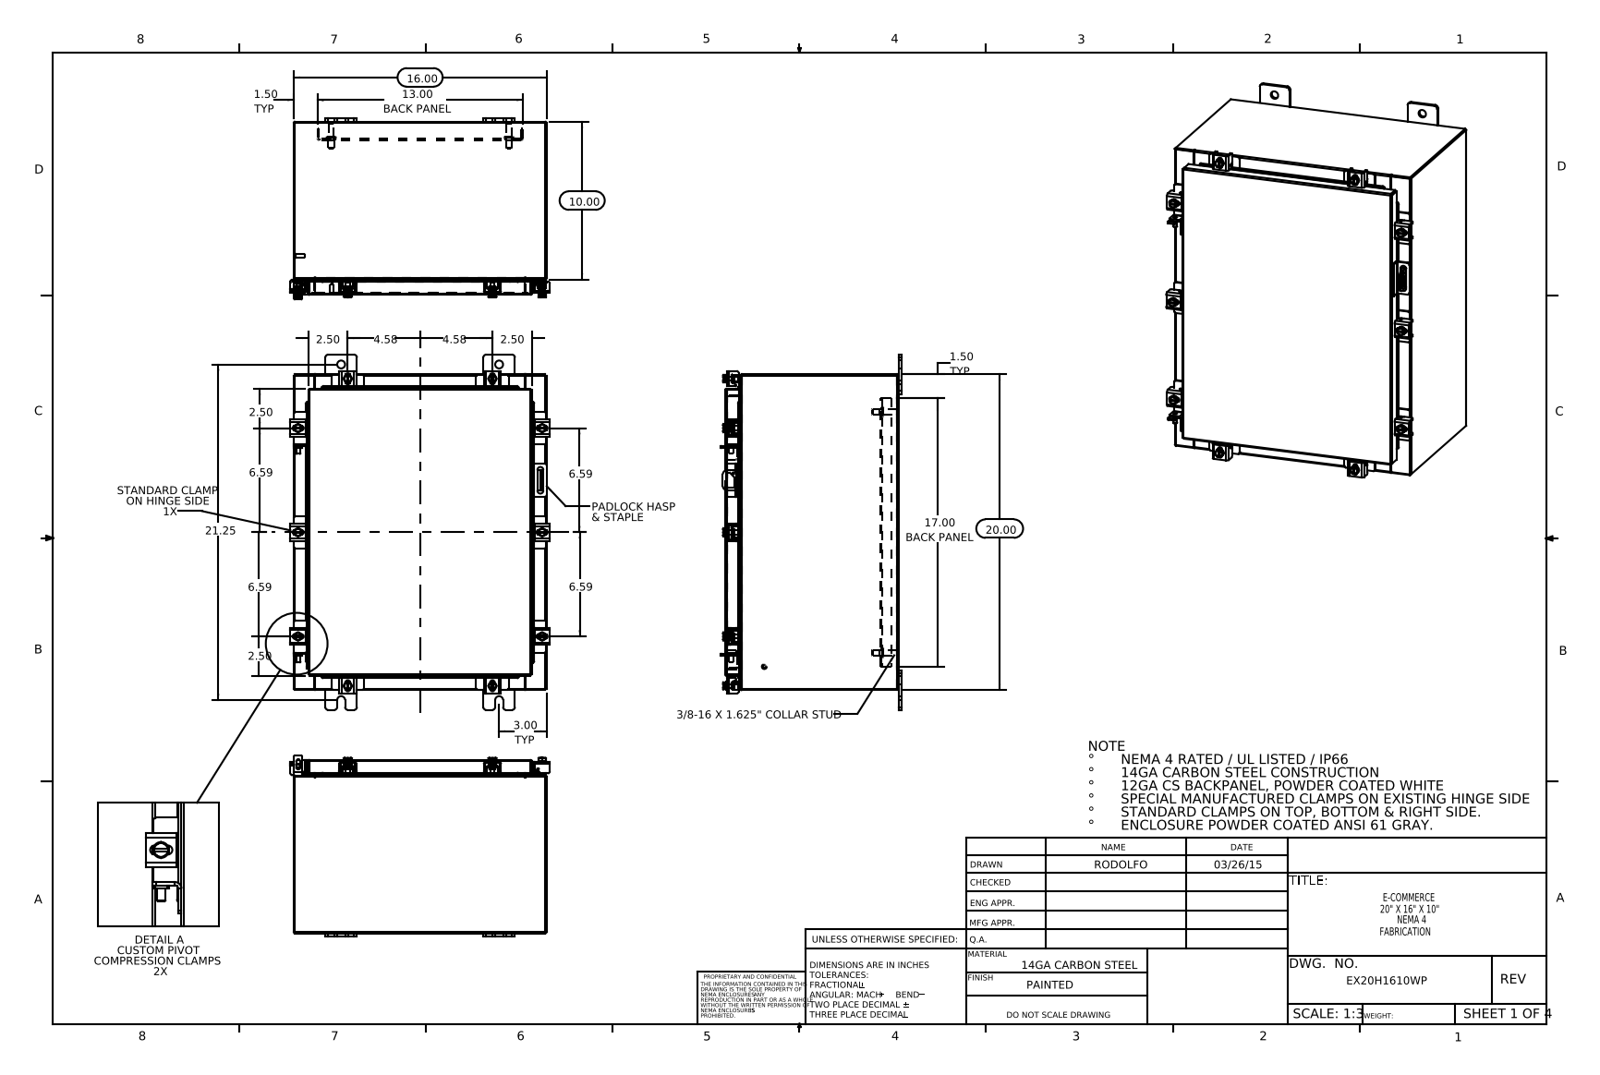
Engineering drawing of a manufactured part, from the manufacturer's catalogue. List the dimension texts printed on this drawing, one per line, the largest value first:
21.25
20.00
17.00 BACK PANEL
16.00
13.00 BACK PANEL
10.00
6.59
6.59
6.59
6.59
4.58
4.58
3.00 TYP
2.50
2.50
2.50
2.50
1.50 TYP
1.50 TYP
